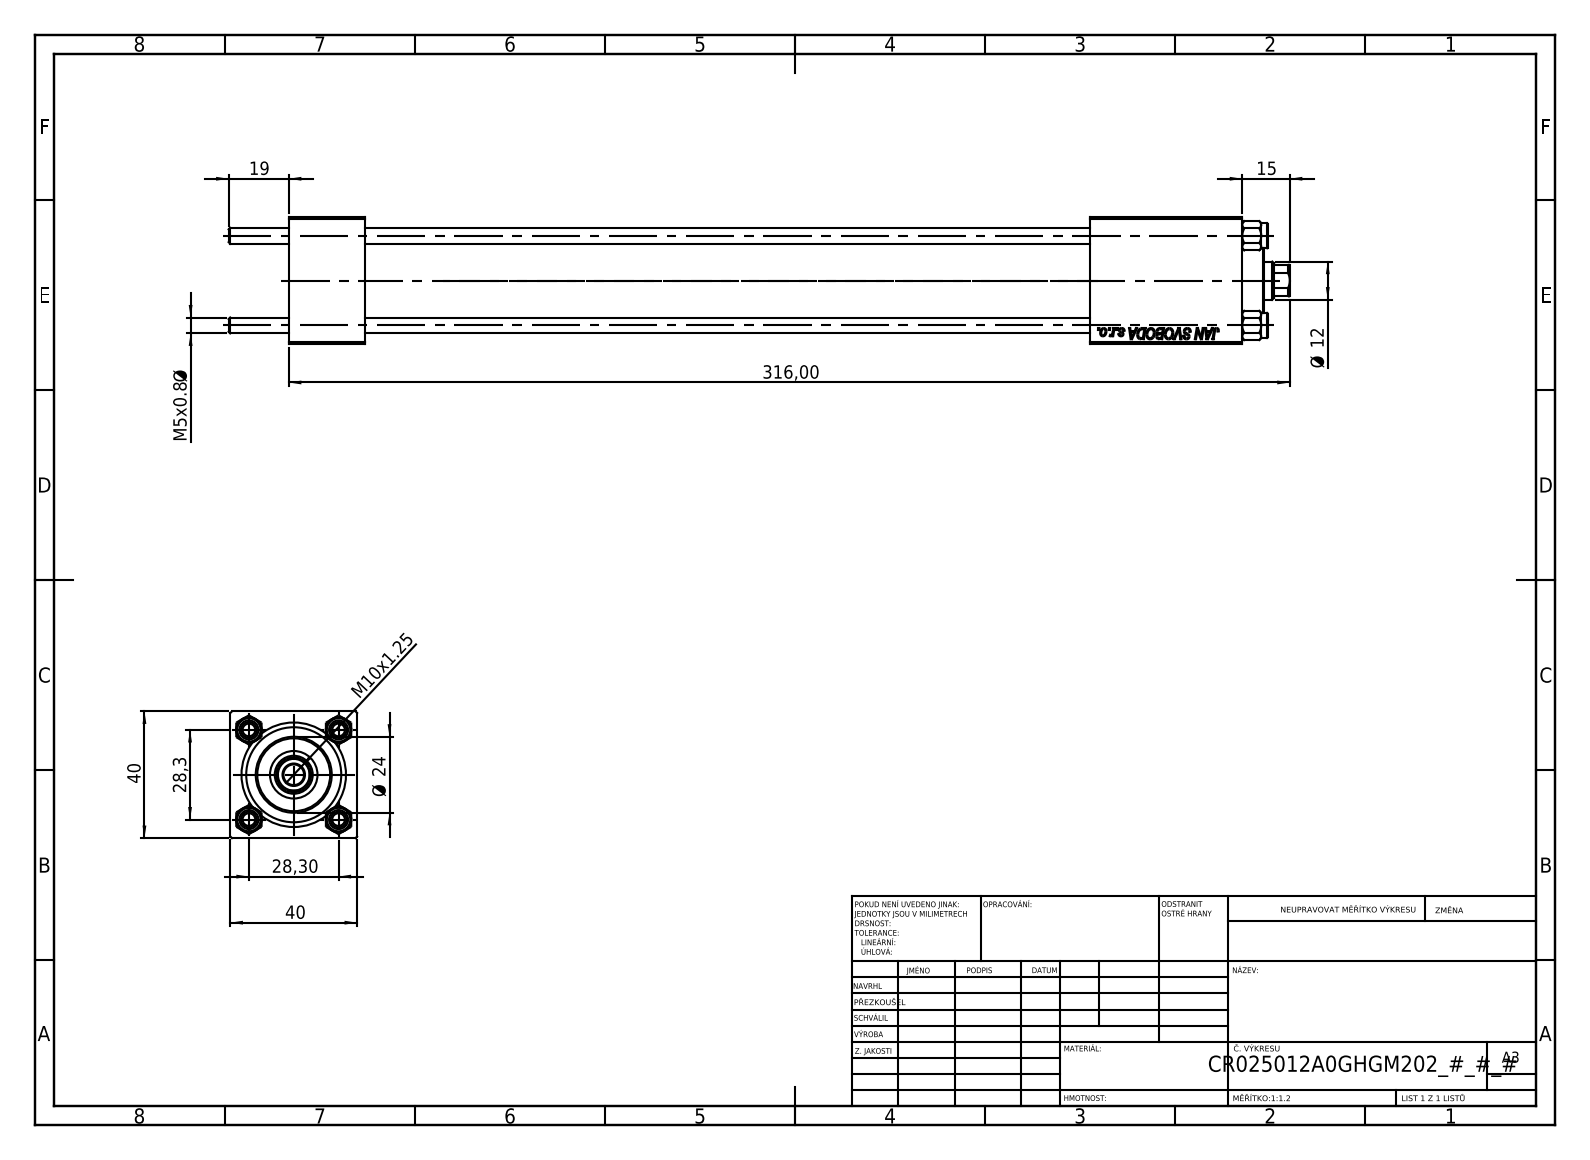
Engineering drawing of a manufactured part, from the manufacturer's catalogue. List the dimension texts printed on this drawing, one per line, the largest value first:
316,00
40
40
28,3
28,30
Ø 24
19
15
Ø 12
M10x1.25
M5x0.8 Ø
